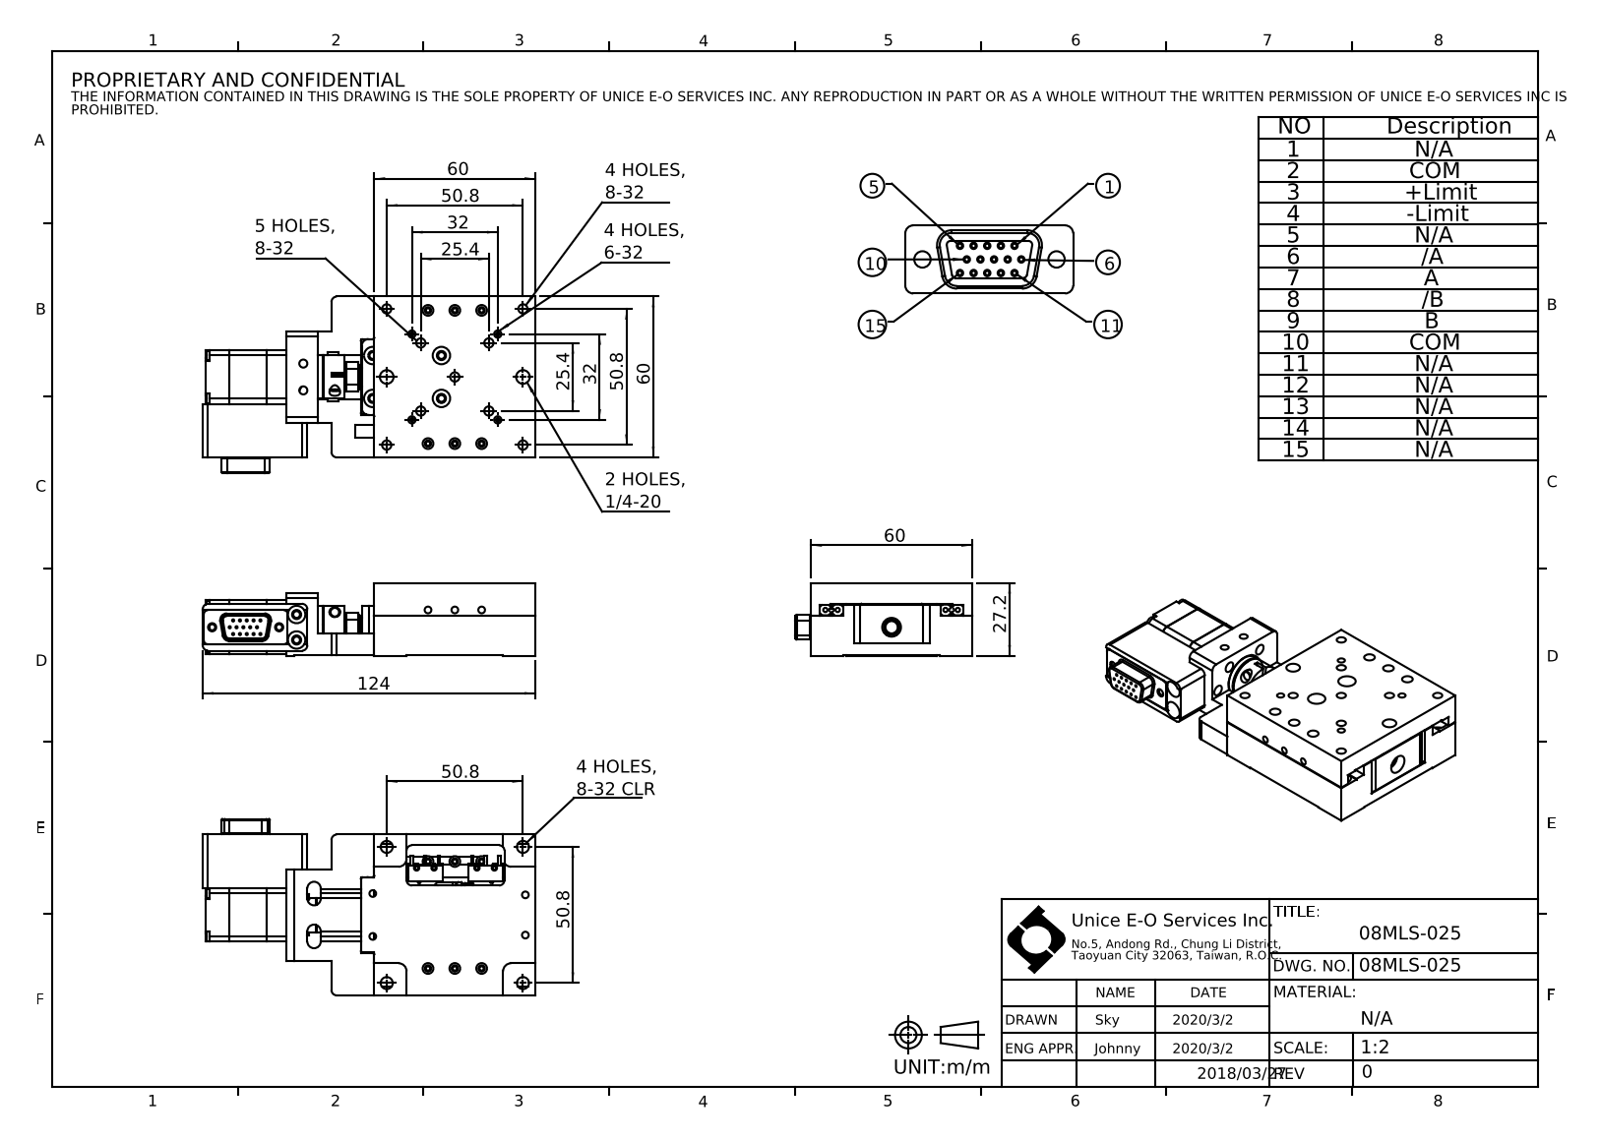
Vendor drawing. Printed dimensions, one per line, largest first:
124
60
60
60
50.8
50.8
50.8
50.8
32
32
27.2
25.4
25.4
